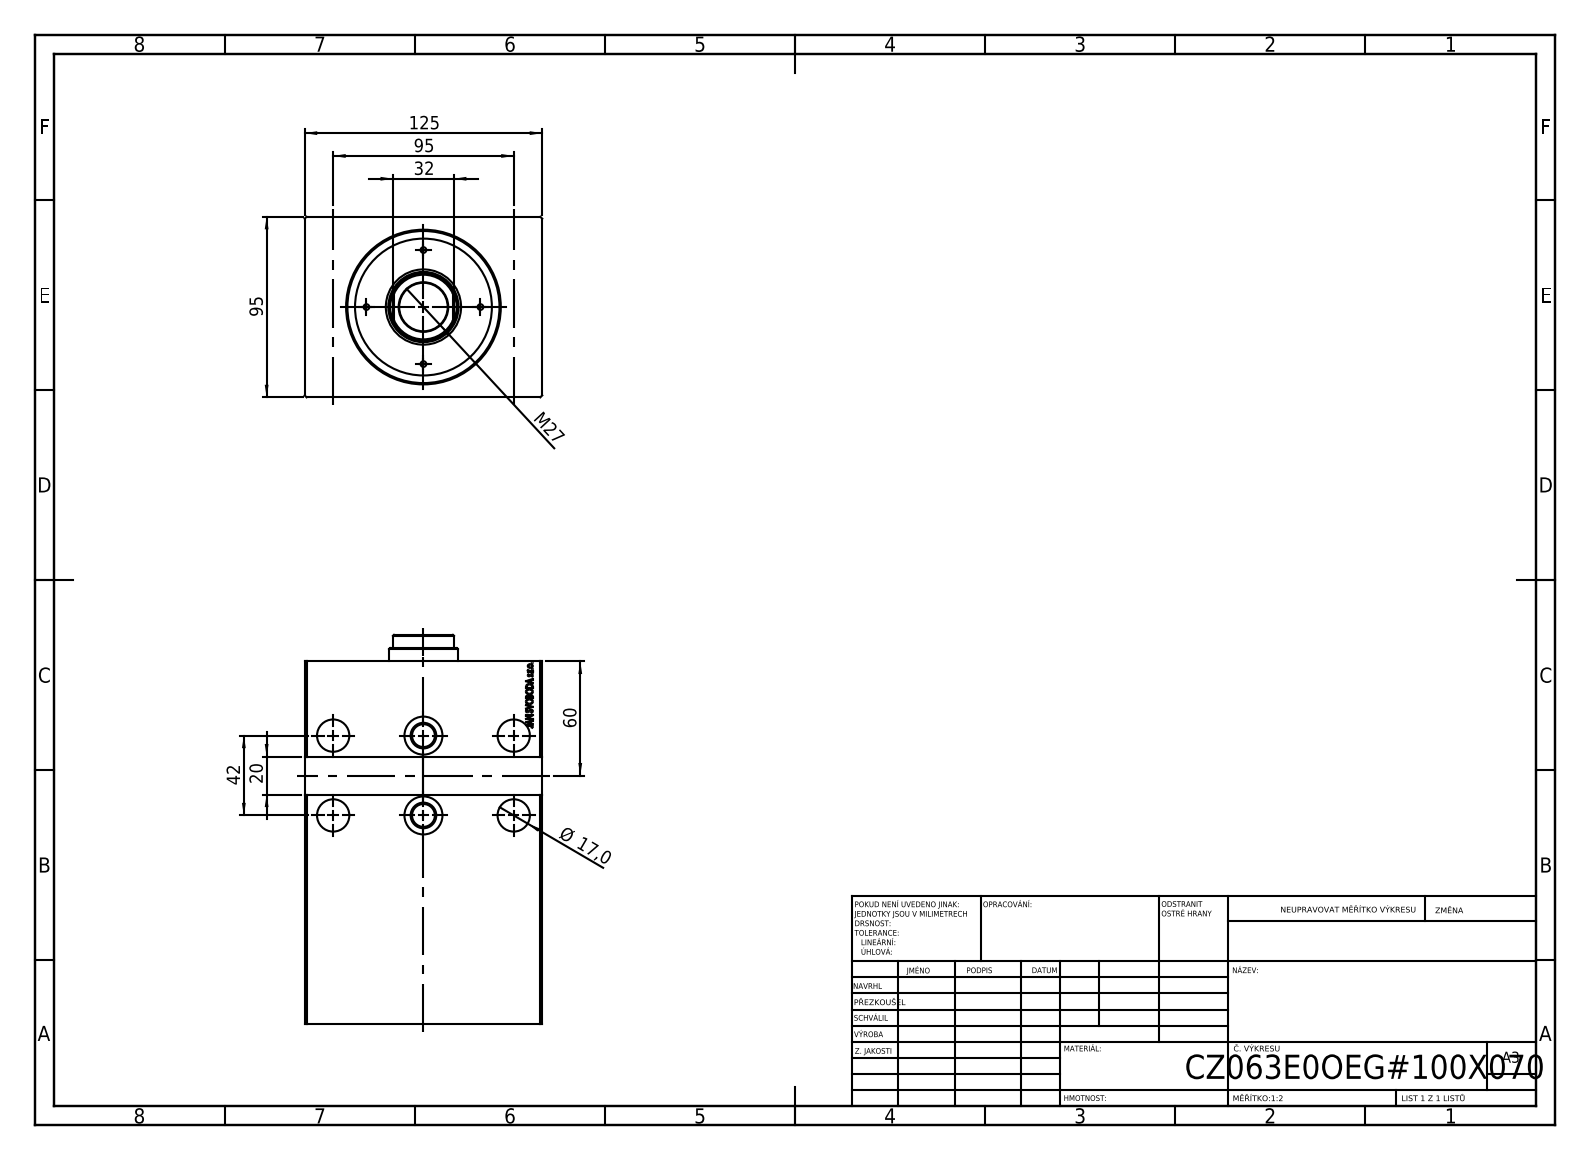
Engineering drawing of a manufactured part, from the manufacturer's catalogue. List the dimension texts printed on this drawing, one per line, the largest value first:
125
95
95
60
42
32
M27
20
Ø 17,0
